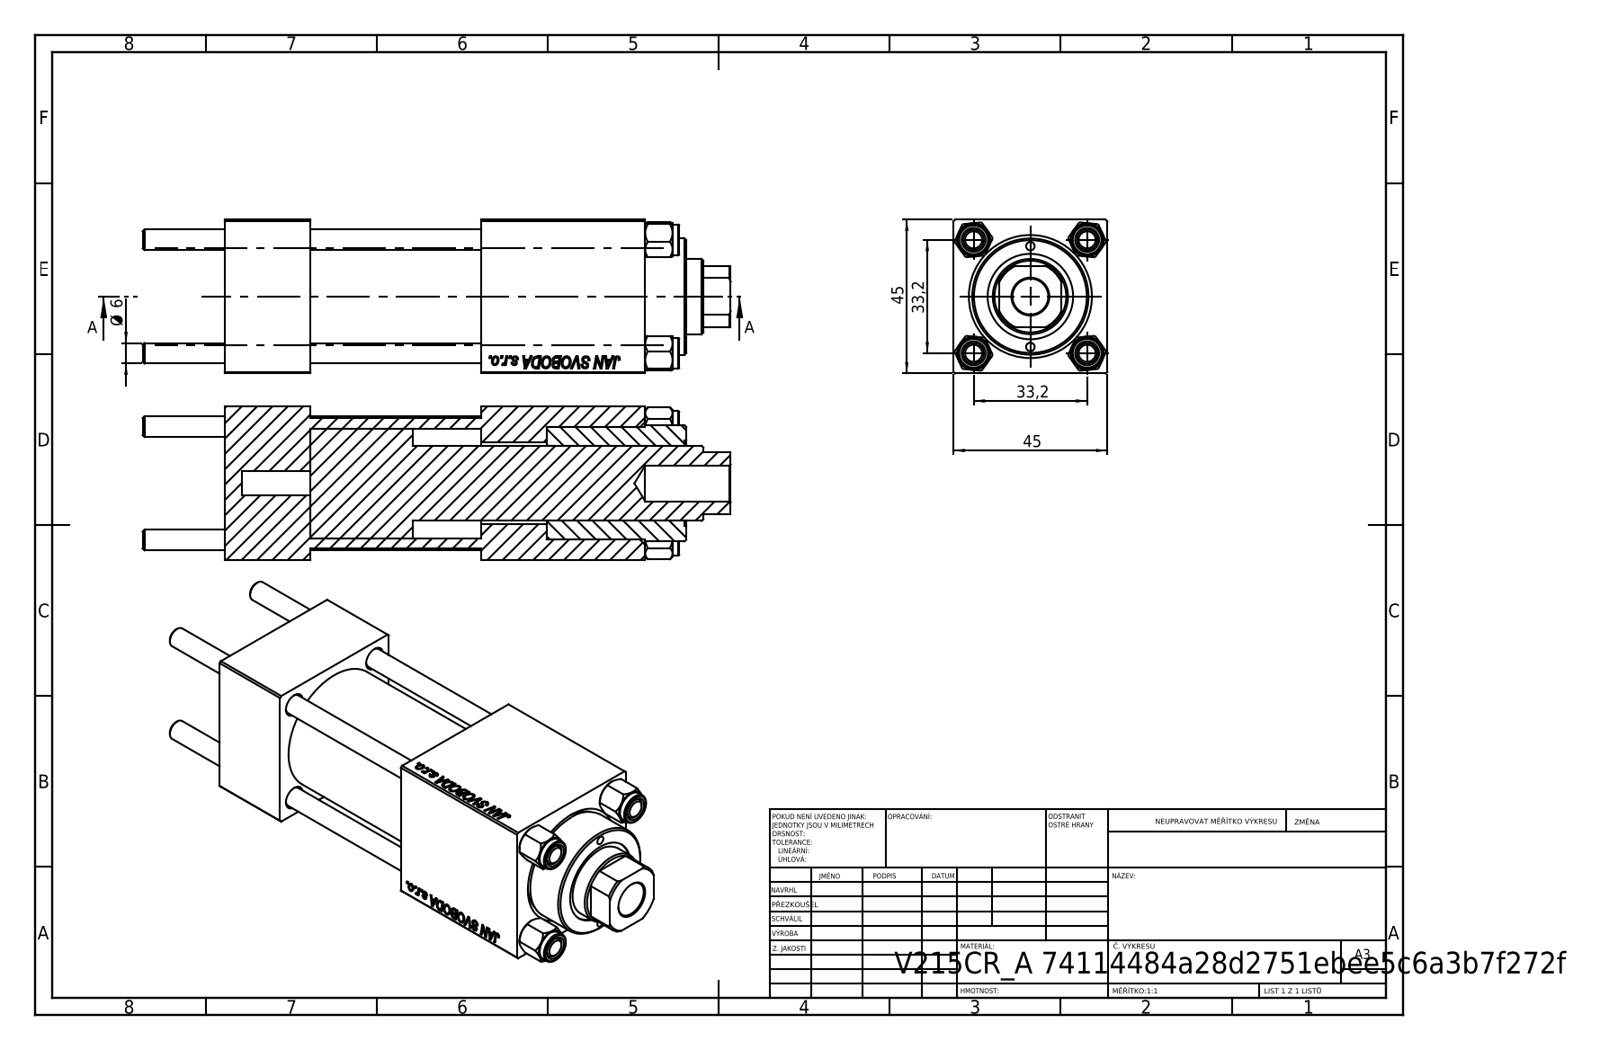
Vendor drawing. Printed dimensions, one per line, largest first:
45
45
33,2
33,2
Ø 6
